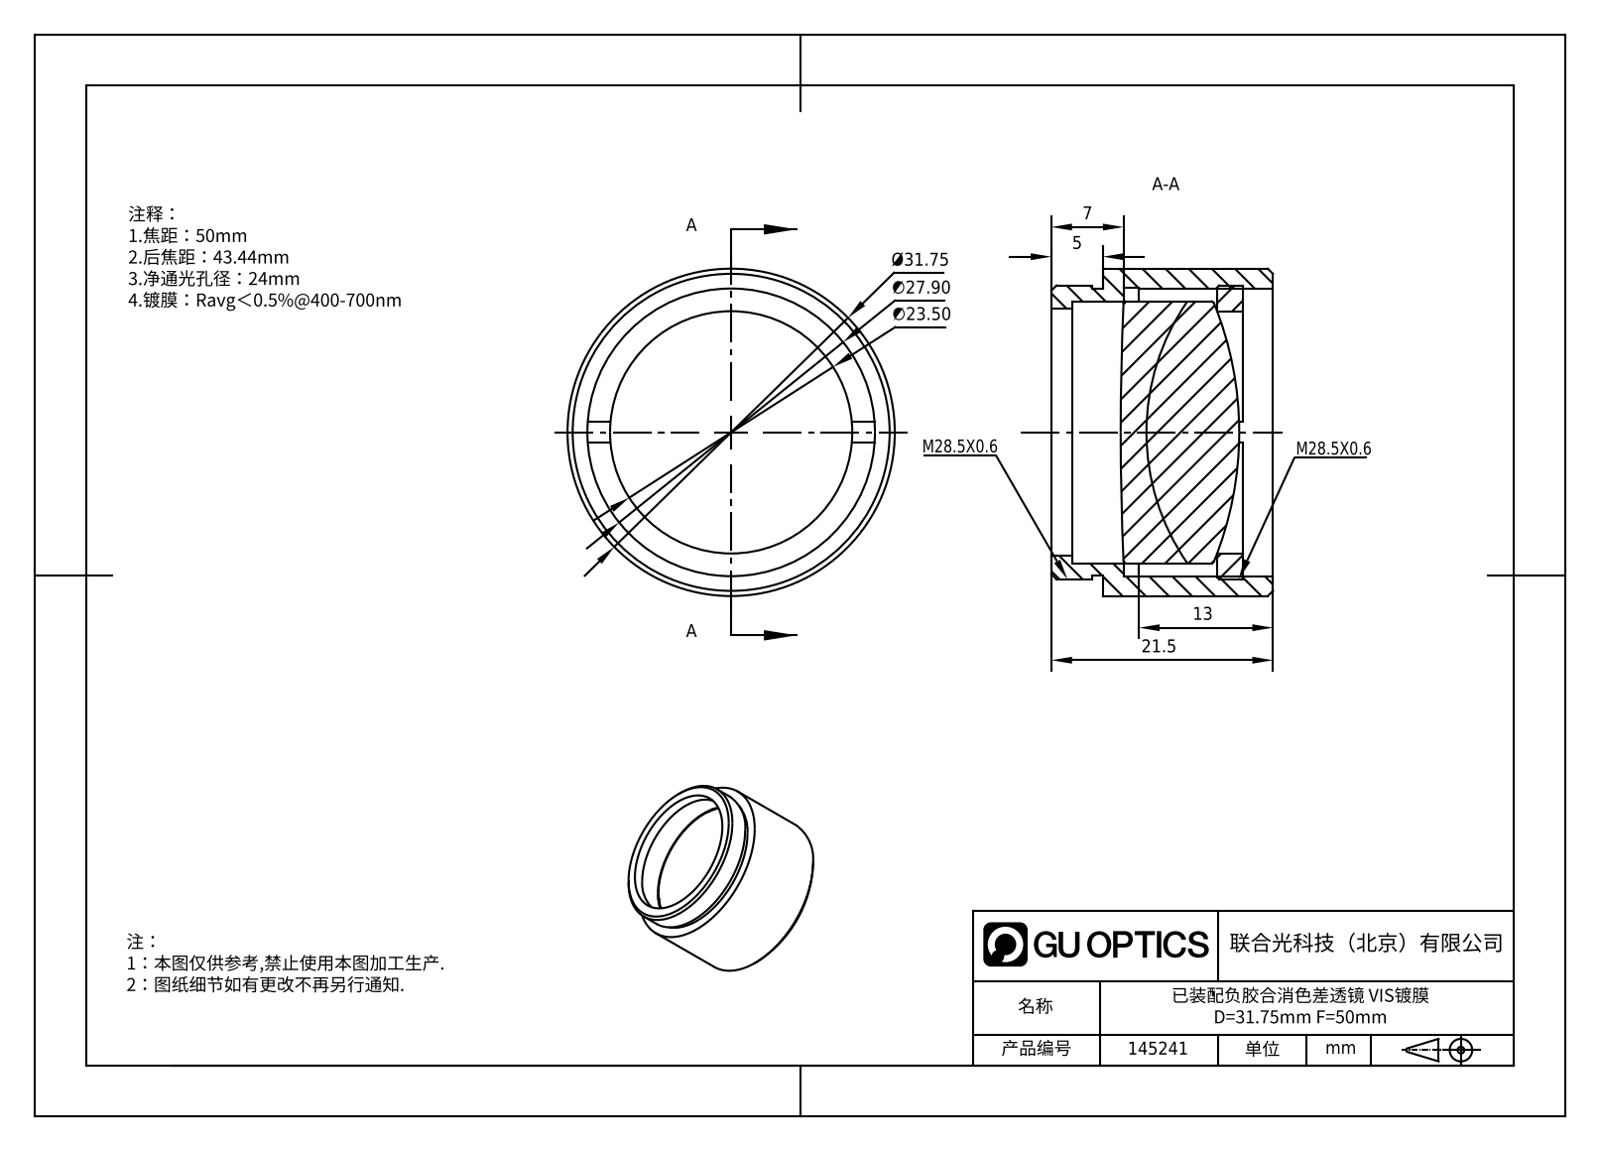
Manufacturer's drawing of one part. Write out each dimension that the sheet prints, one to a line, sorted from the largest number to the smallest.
Ø31.75
∅27.90
∅23.50
21.5
13
7
5
